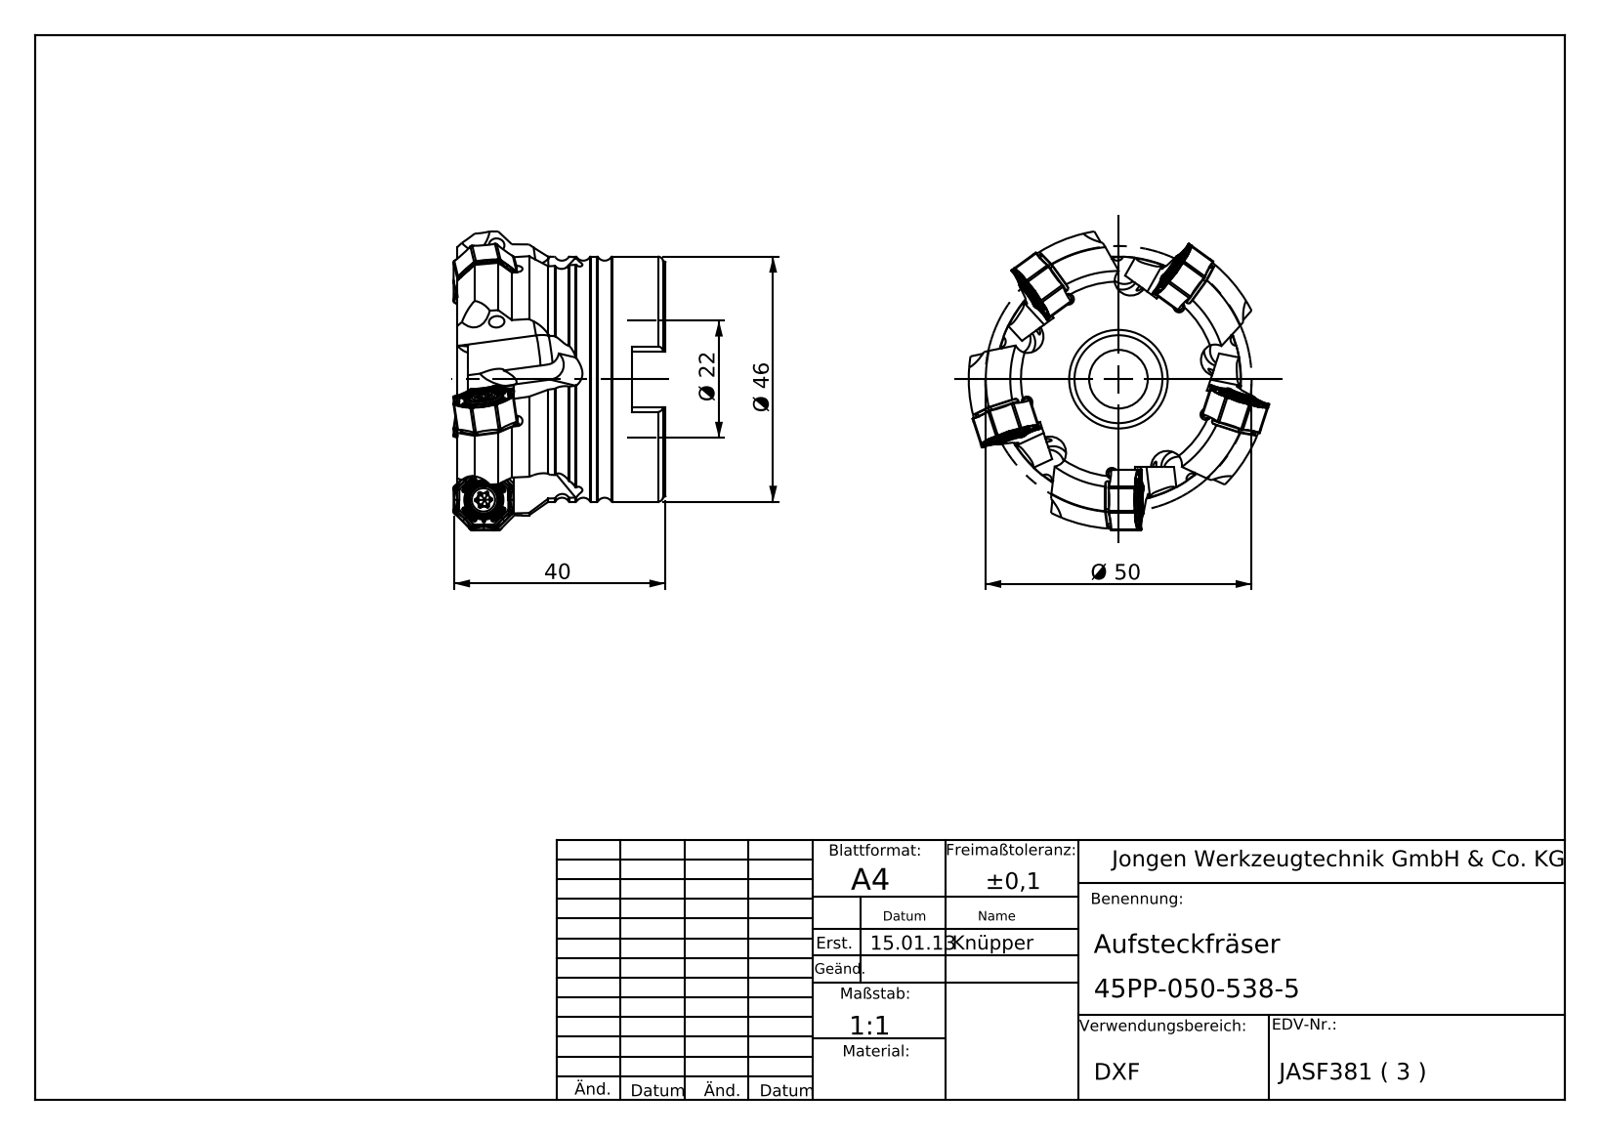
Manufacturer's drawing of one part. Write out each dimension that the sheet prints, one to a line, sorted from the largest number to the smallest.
Ø 50
Ø 46
40
Ø 22
